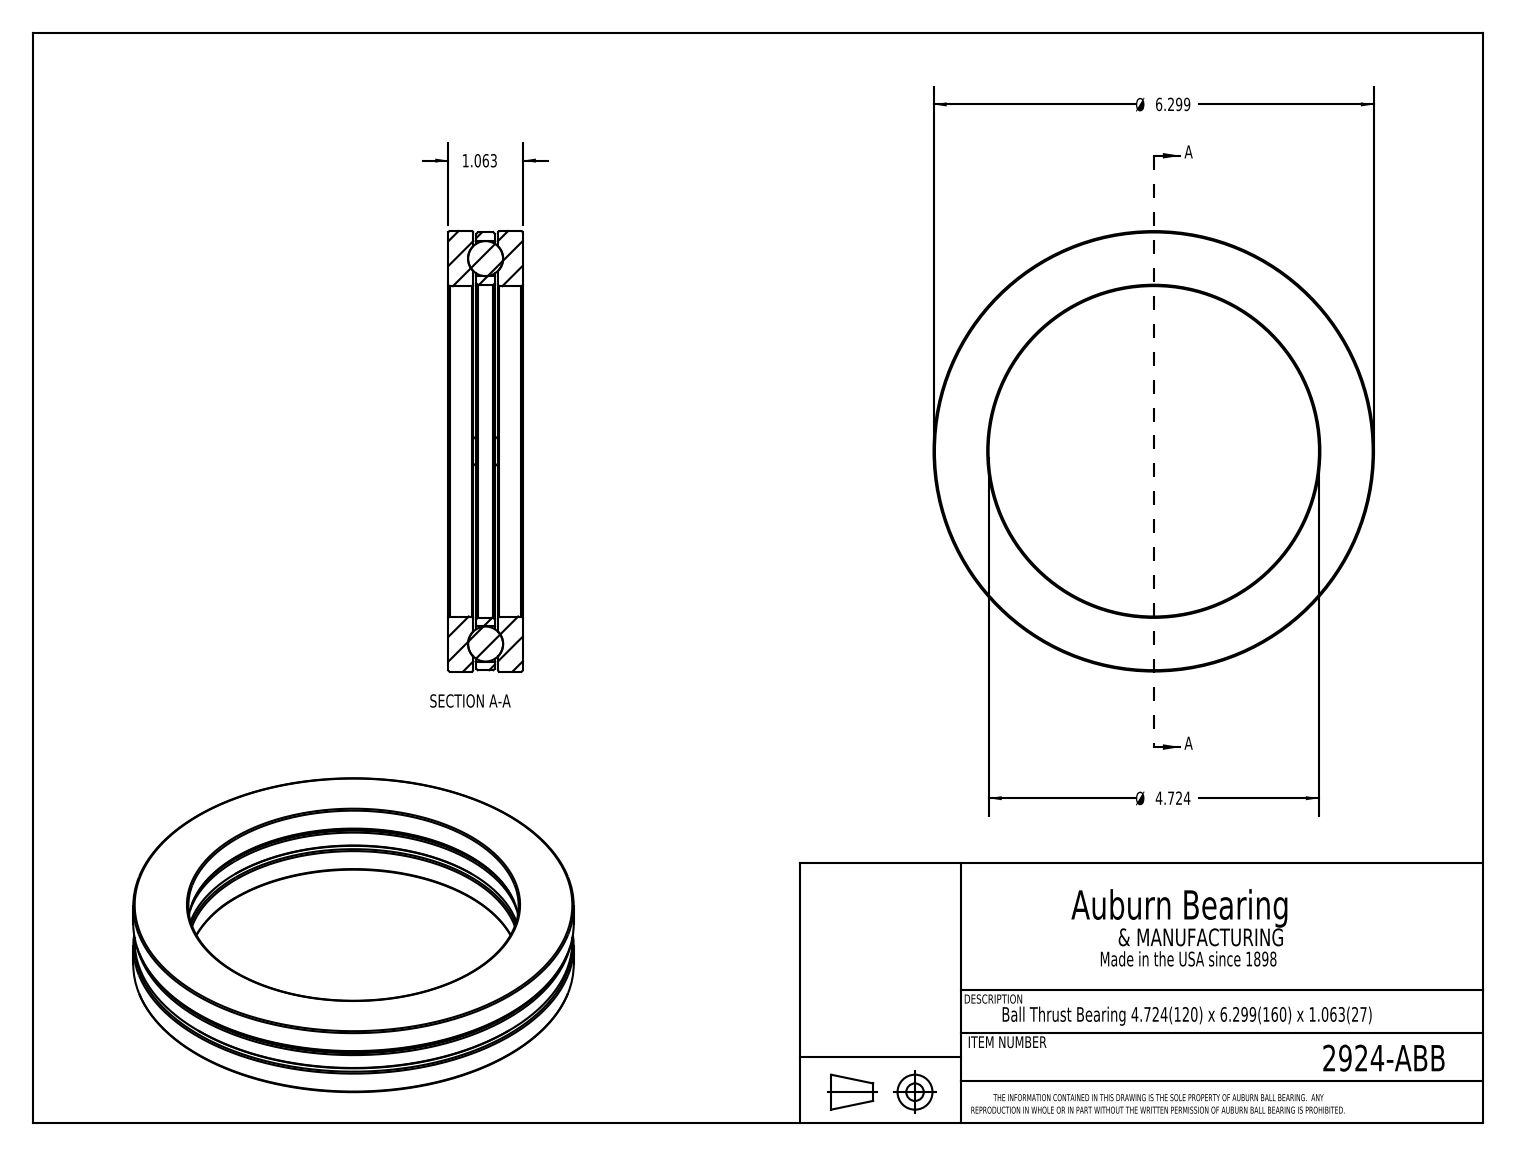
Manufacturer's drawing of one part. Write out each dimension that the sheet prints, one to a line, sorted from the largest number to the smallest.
Ø 6.299
Ø 4.724
1.063
